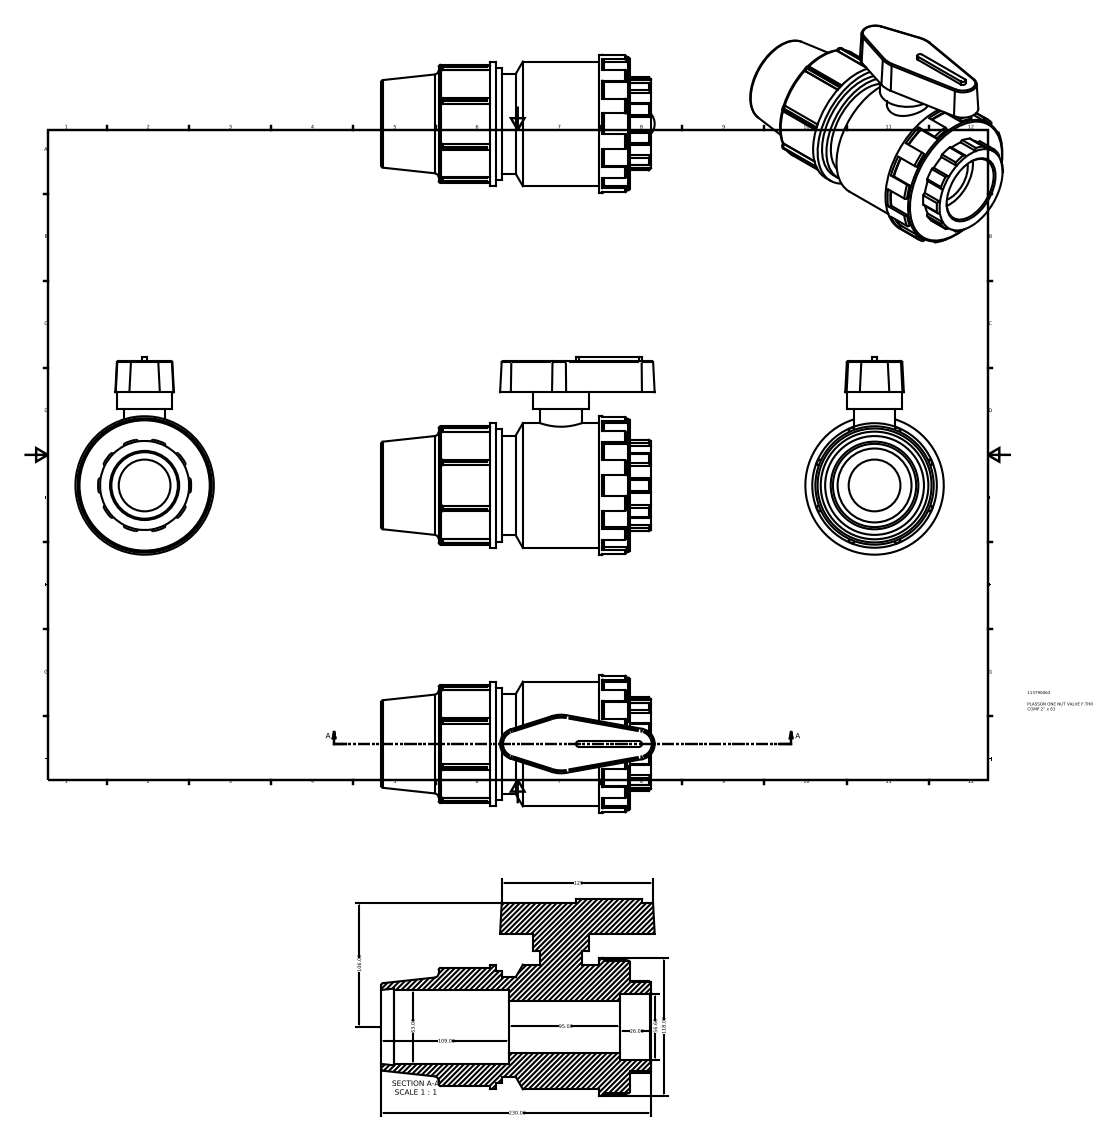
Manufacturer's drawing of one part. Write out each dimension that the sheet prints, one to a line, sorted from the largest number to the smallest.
230.00
129
118.00
109.00
106.00
95.00
63.00
56.66
26.00
